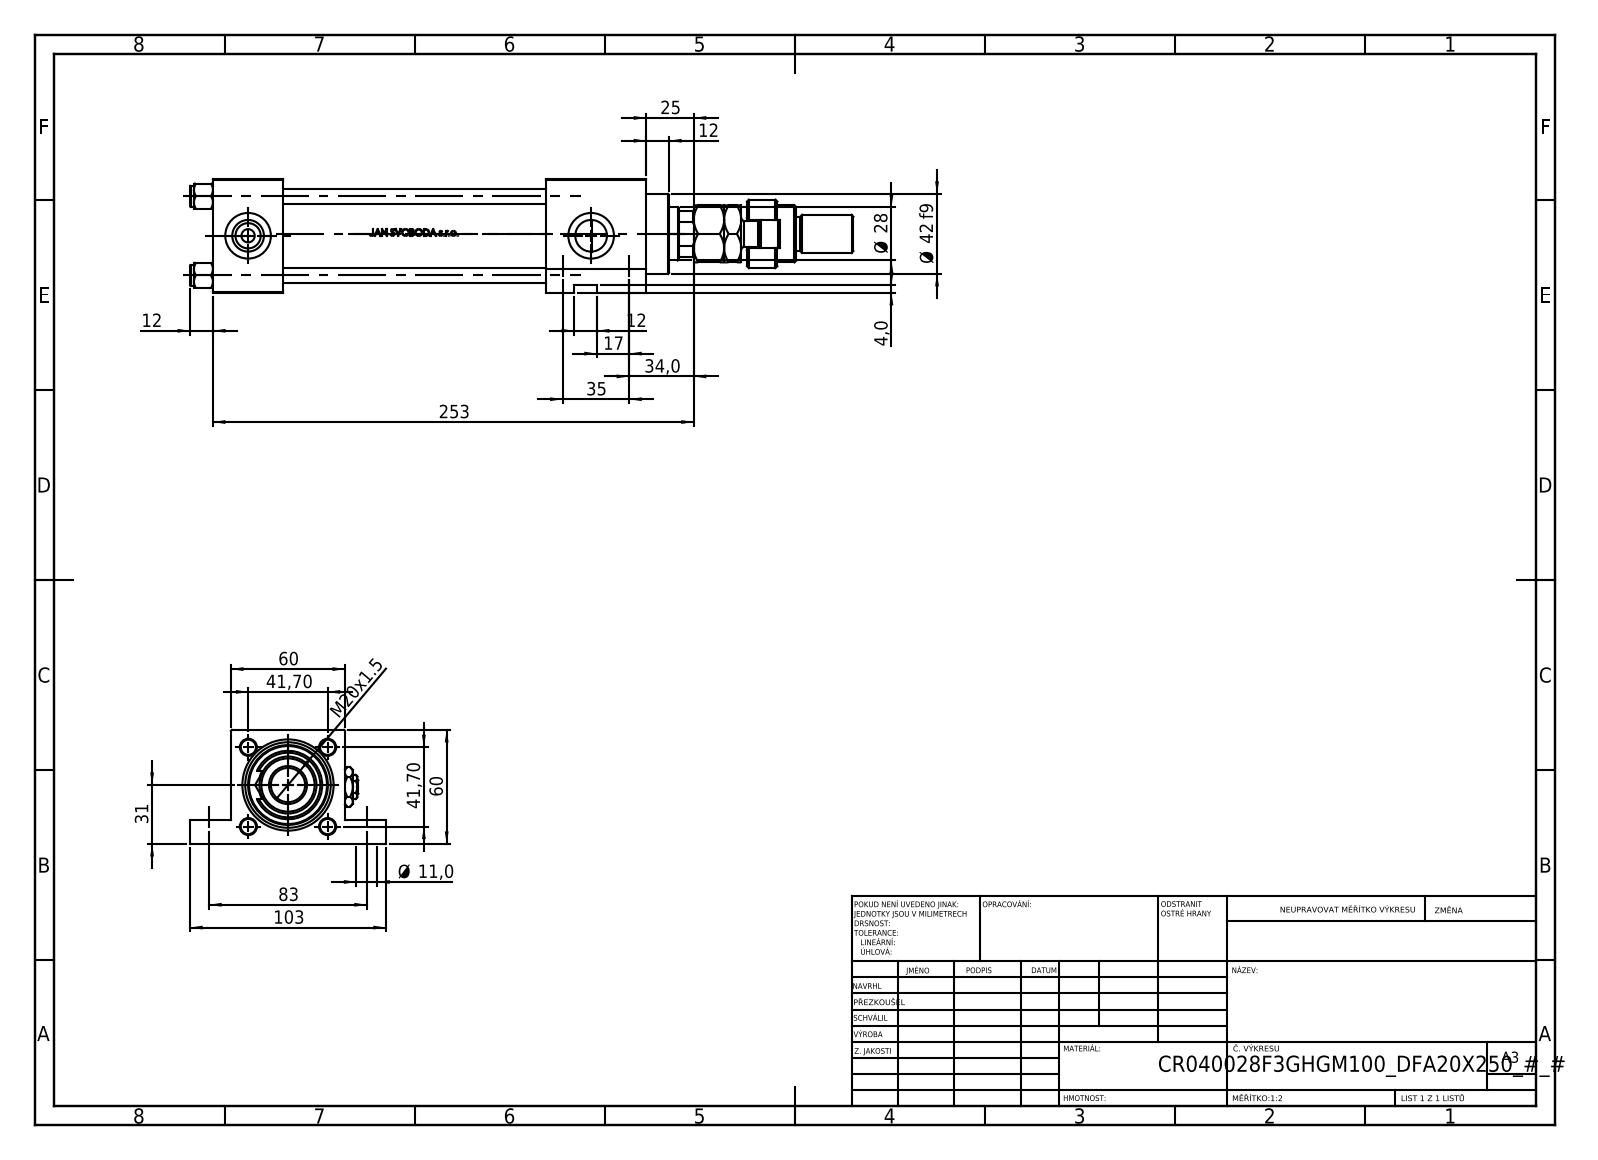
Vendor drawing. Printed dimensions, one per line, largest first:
253
103
83
60
60
Ø 42 f9
41,70
41,70
35
34,0
31
Ø 28
25
M20x1.5
17
12
12
12
Ø 11,0
4,0
